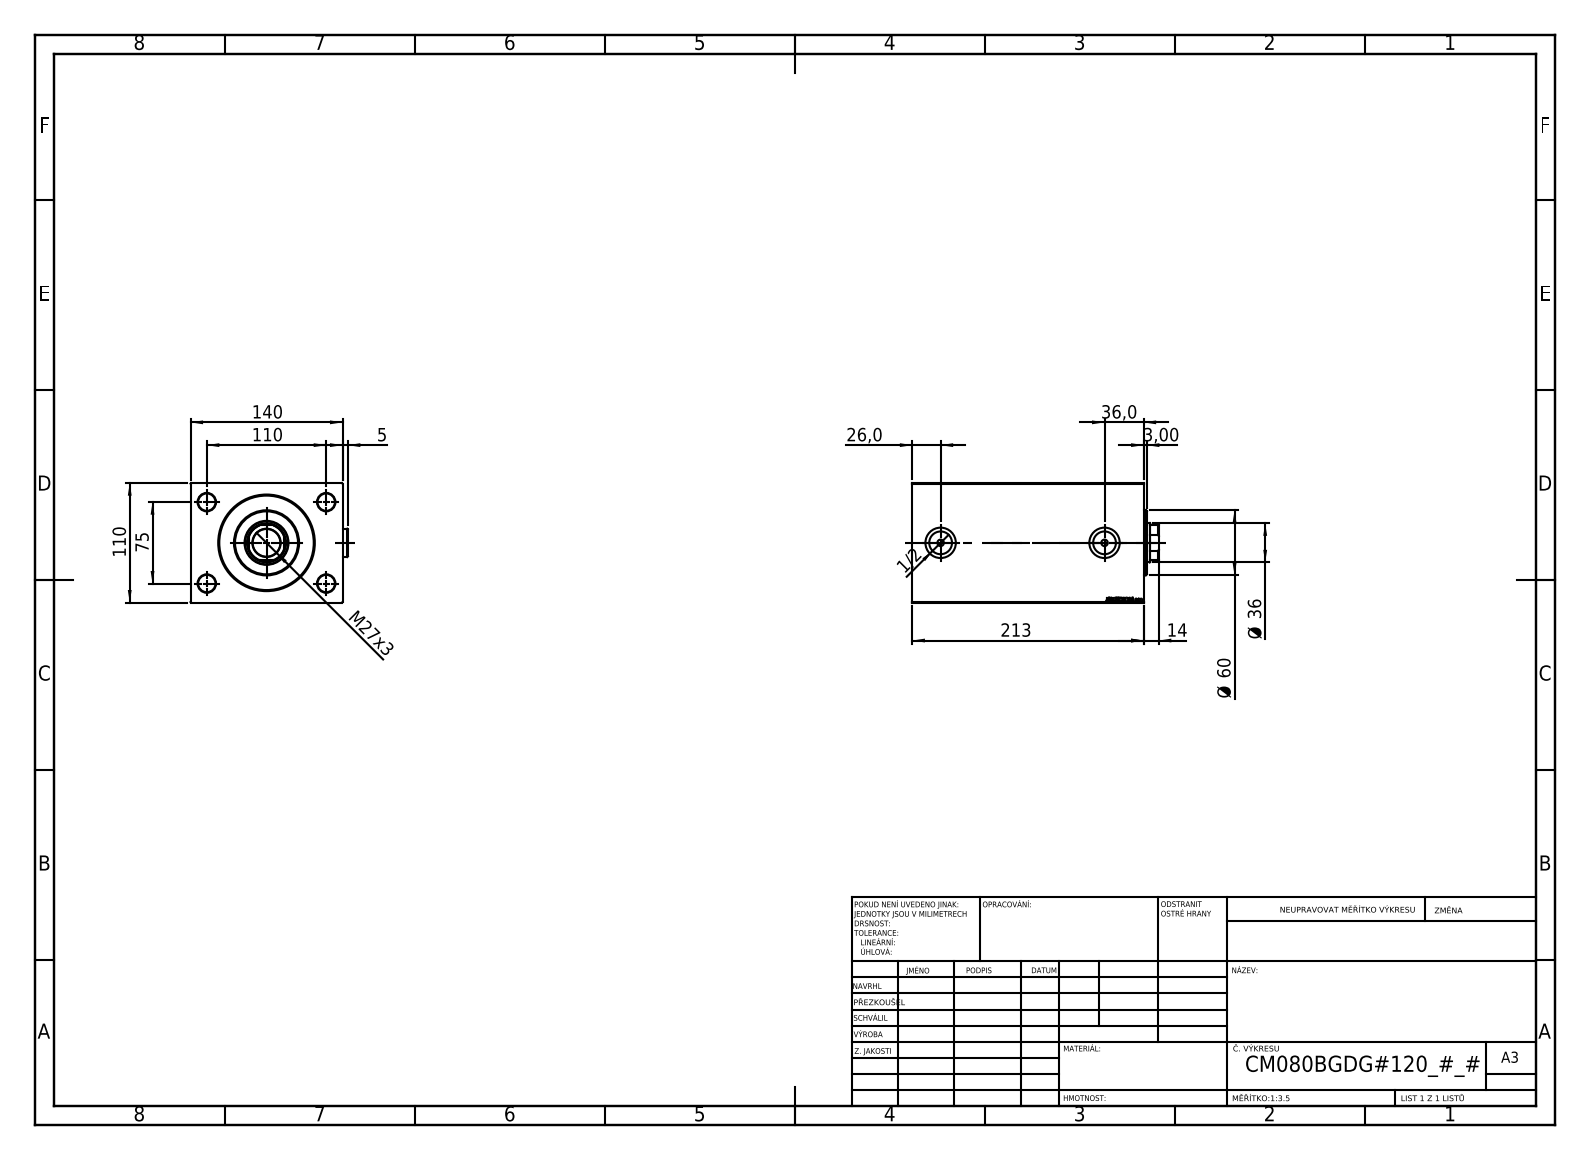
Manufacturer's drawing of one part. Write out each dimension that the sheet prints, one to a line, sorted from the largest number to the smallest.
213
140
110
110
75
Ø 60
36,0
Ø 36
M27x3
26,0
14
5
3,00
1/2
